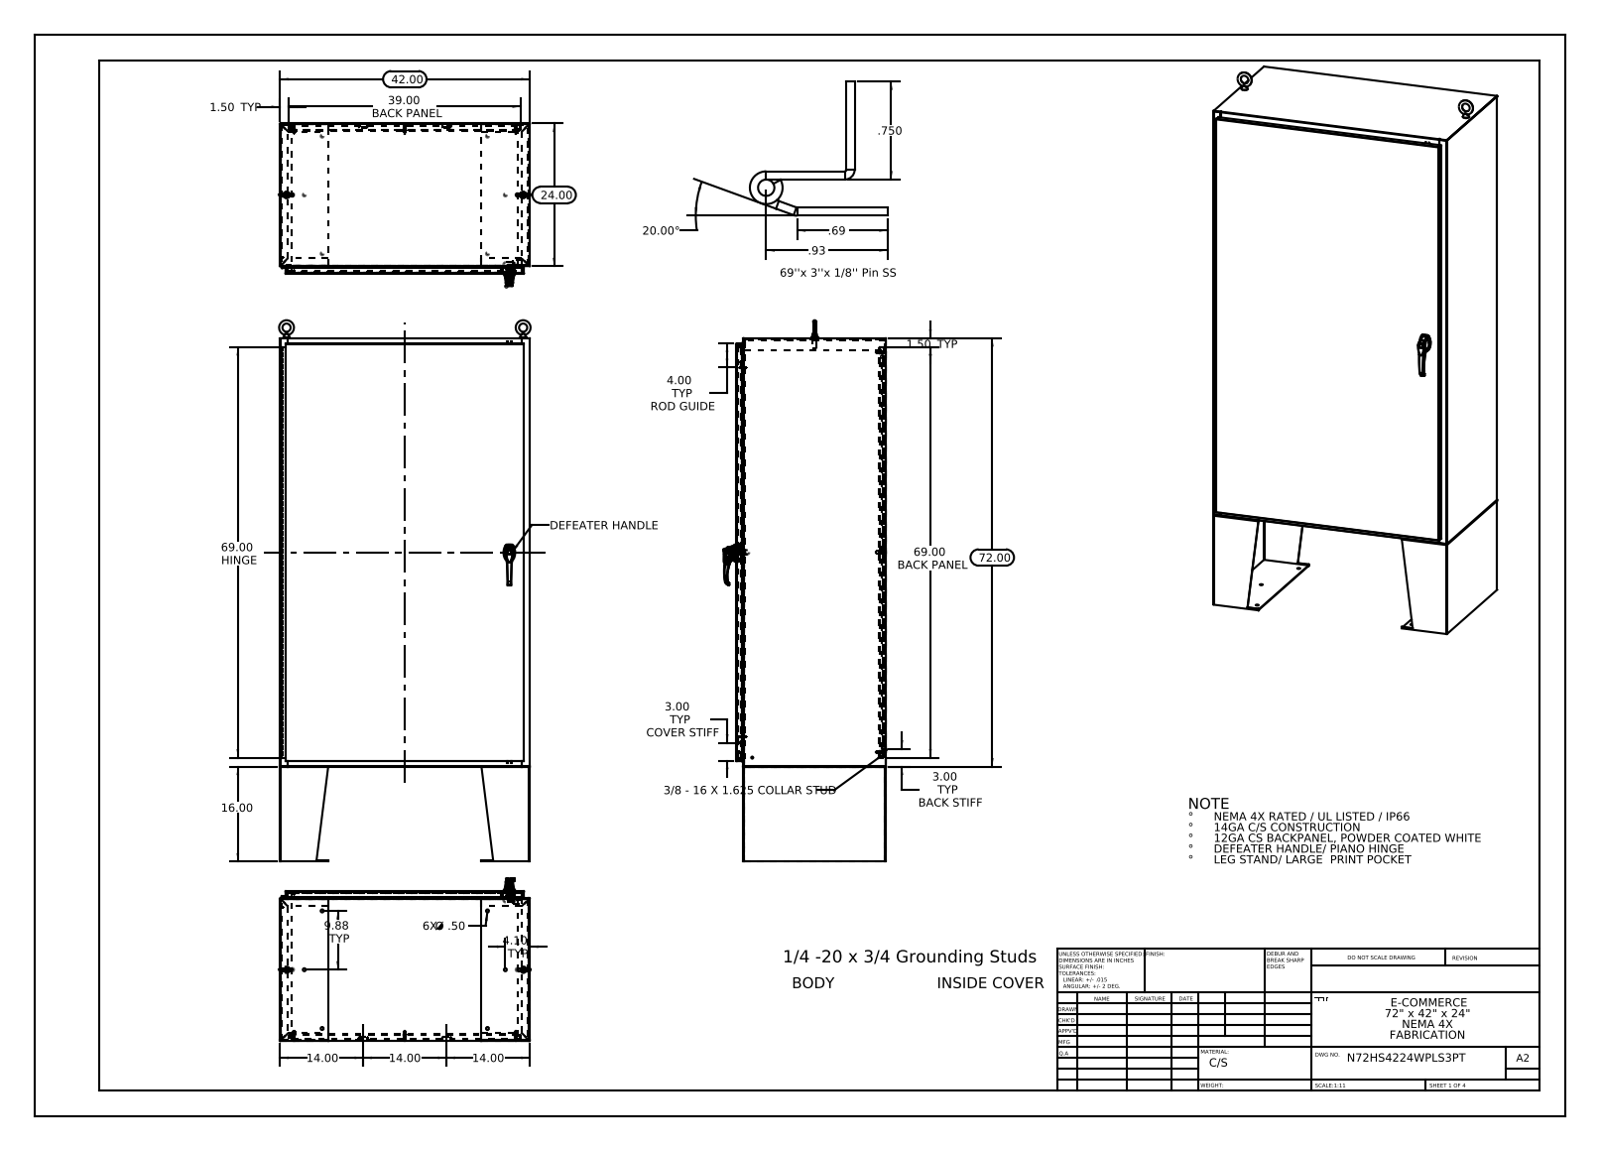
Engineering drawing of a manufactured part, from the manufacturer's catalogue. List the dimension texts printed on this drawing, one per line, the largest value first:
72.00
69.00 HINGE
69.00 BACK PANEL
42.00
39.00 BACK PANEL
24.00
20.00°
16.00
14.00
14.00
14.00
9.88 TYP
4.10 TYP
4.00 TYP ROD GUIDE
3.00 TYP COVER STIFF
3.00 TYP BACK STIFF
1.50 TYP
1.50 TYP
.93
.750
.69
6X Ø .50
